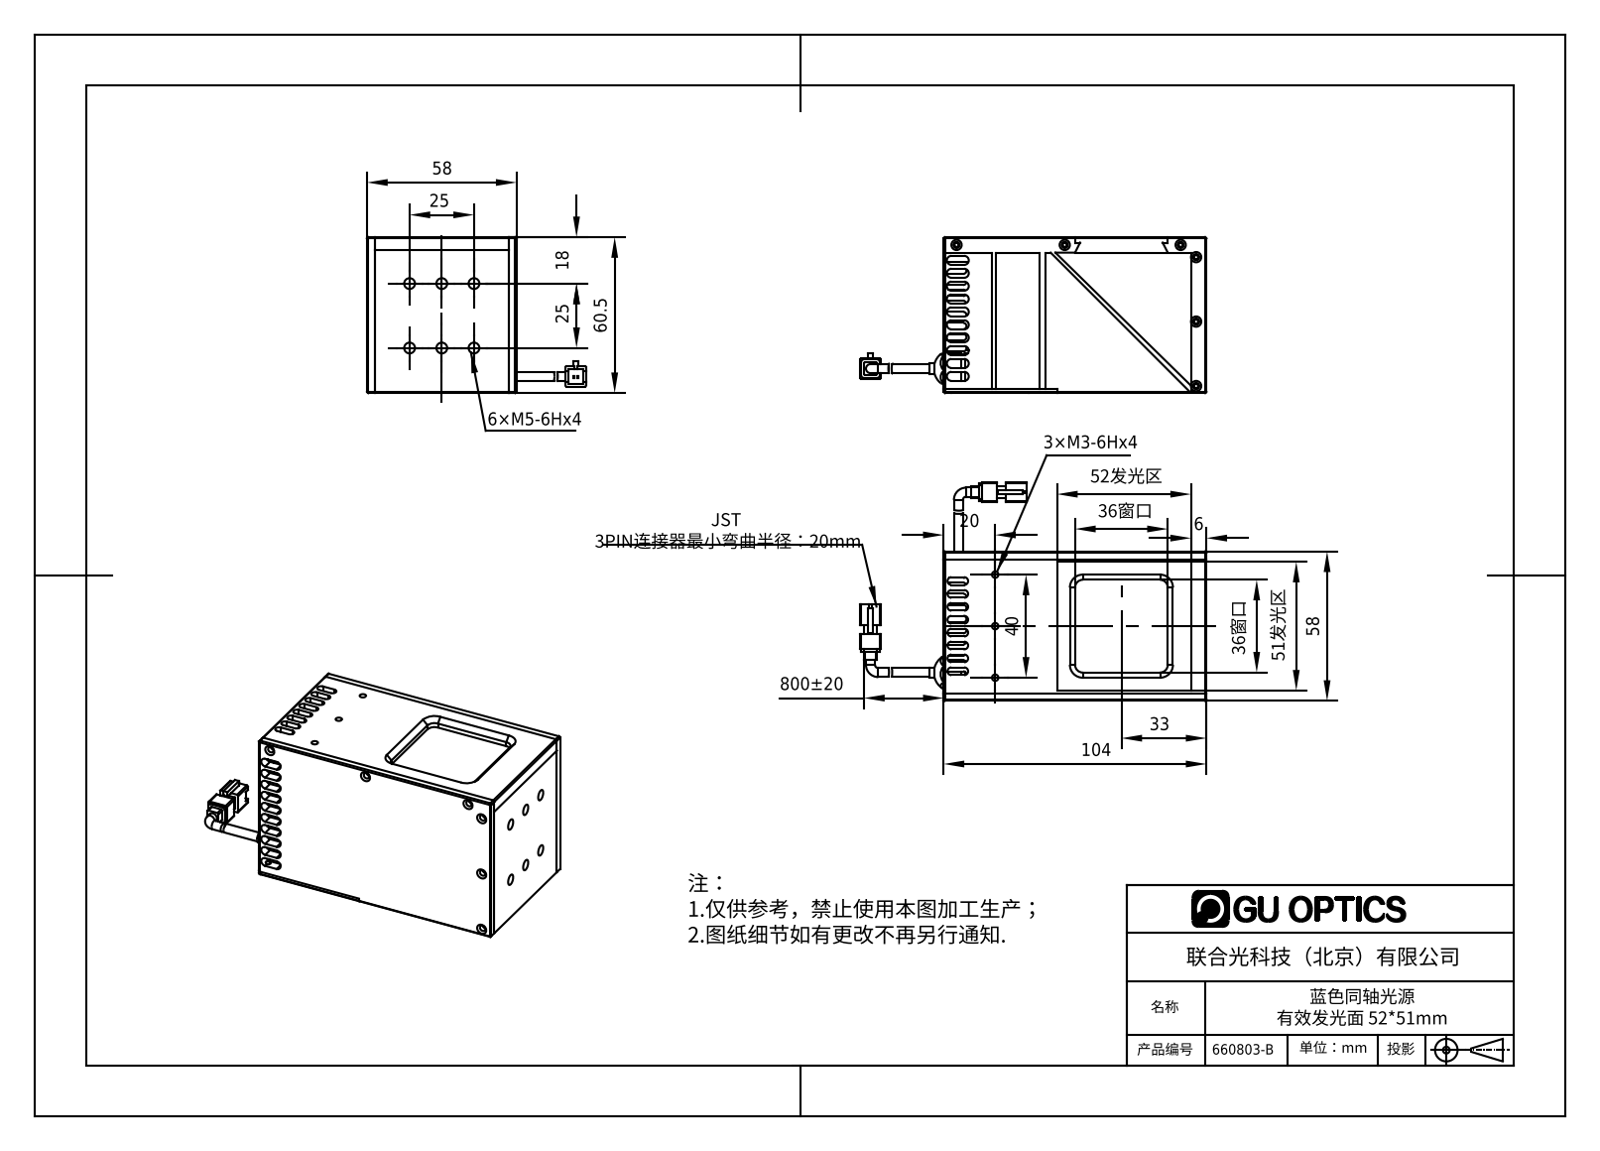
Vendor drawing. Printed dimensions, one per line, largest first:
800±20
104
60.5
58
58
52发光区
51发光区
40
36窗口
36窗口
33
25
25
20
18
6
